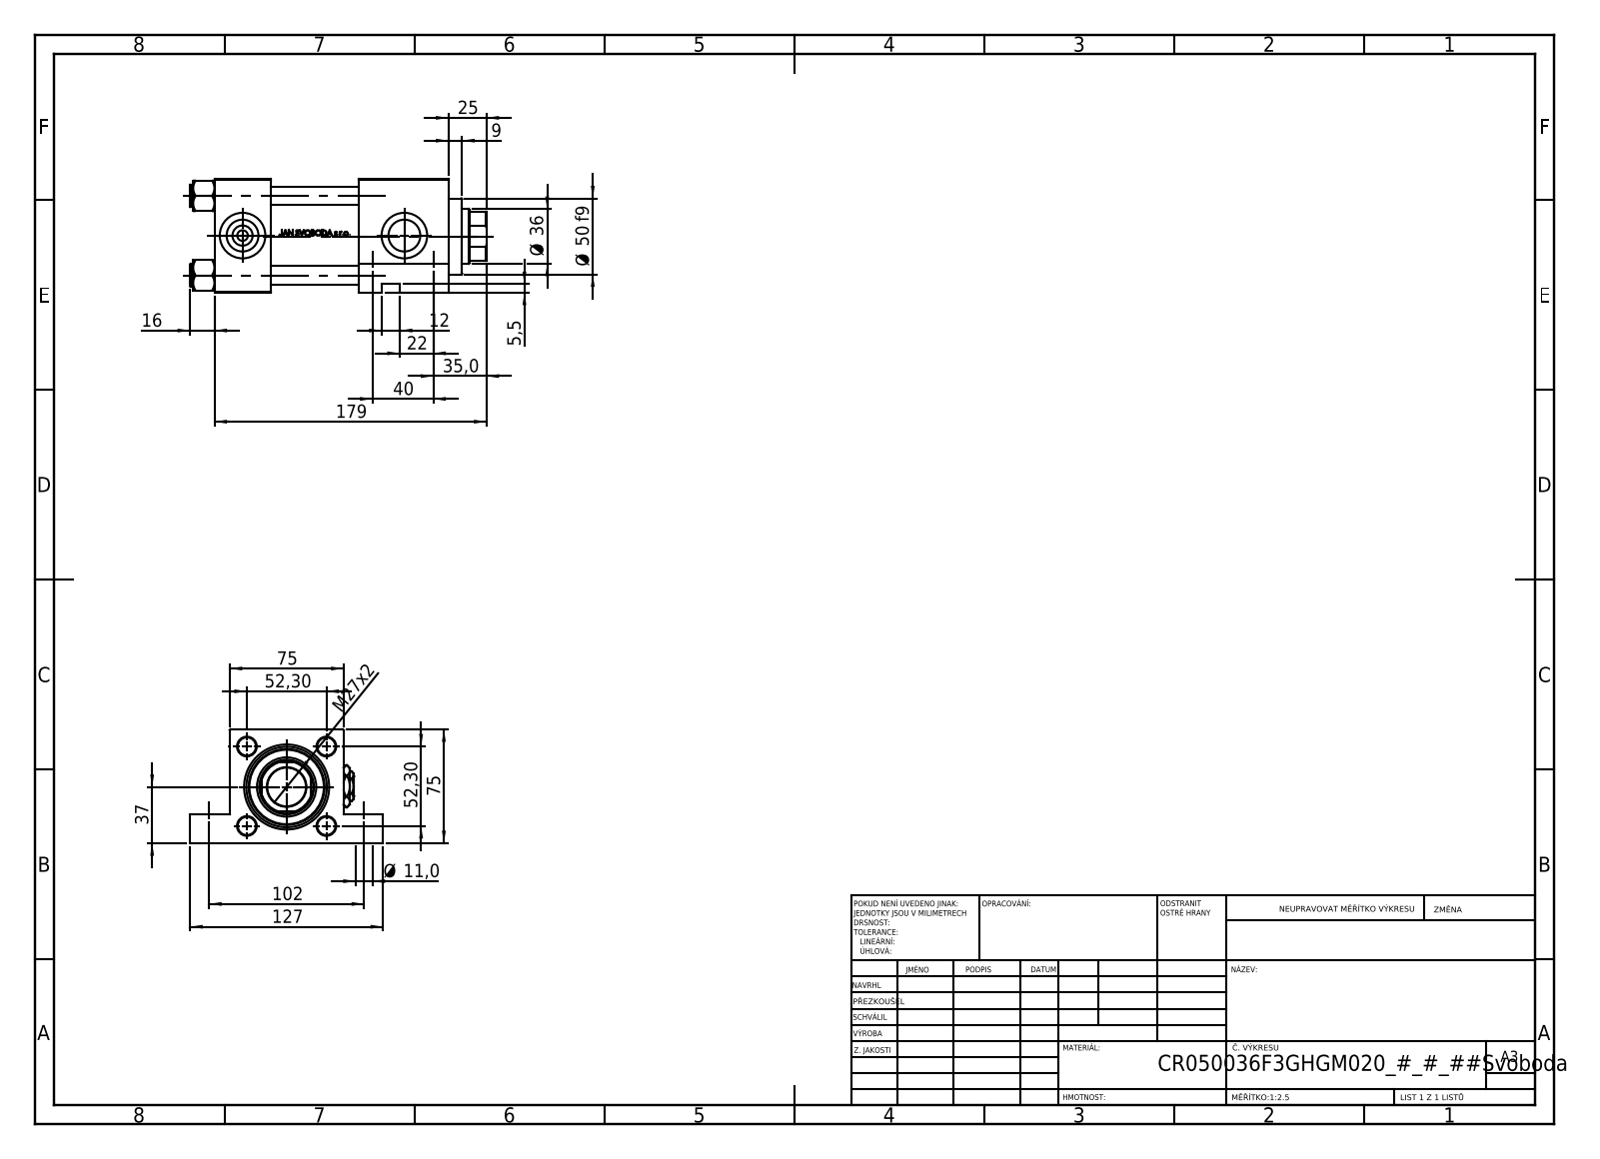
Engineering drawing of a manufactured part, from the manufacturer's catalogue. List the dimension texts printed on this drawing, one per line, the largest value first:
179
127
102
75
75
52,30
52,30
Ø 50 f9
40
37
Ø 36
35,0
M27x2
25
22
16
12
Ø 11,0
9
5,5
